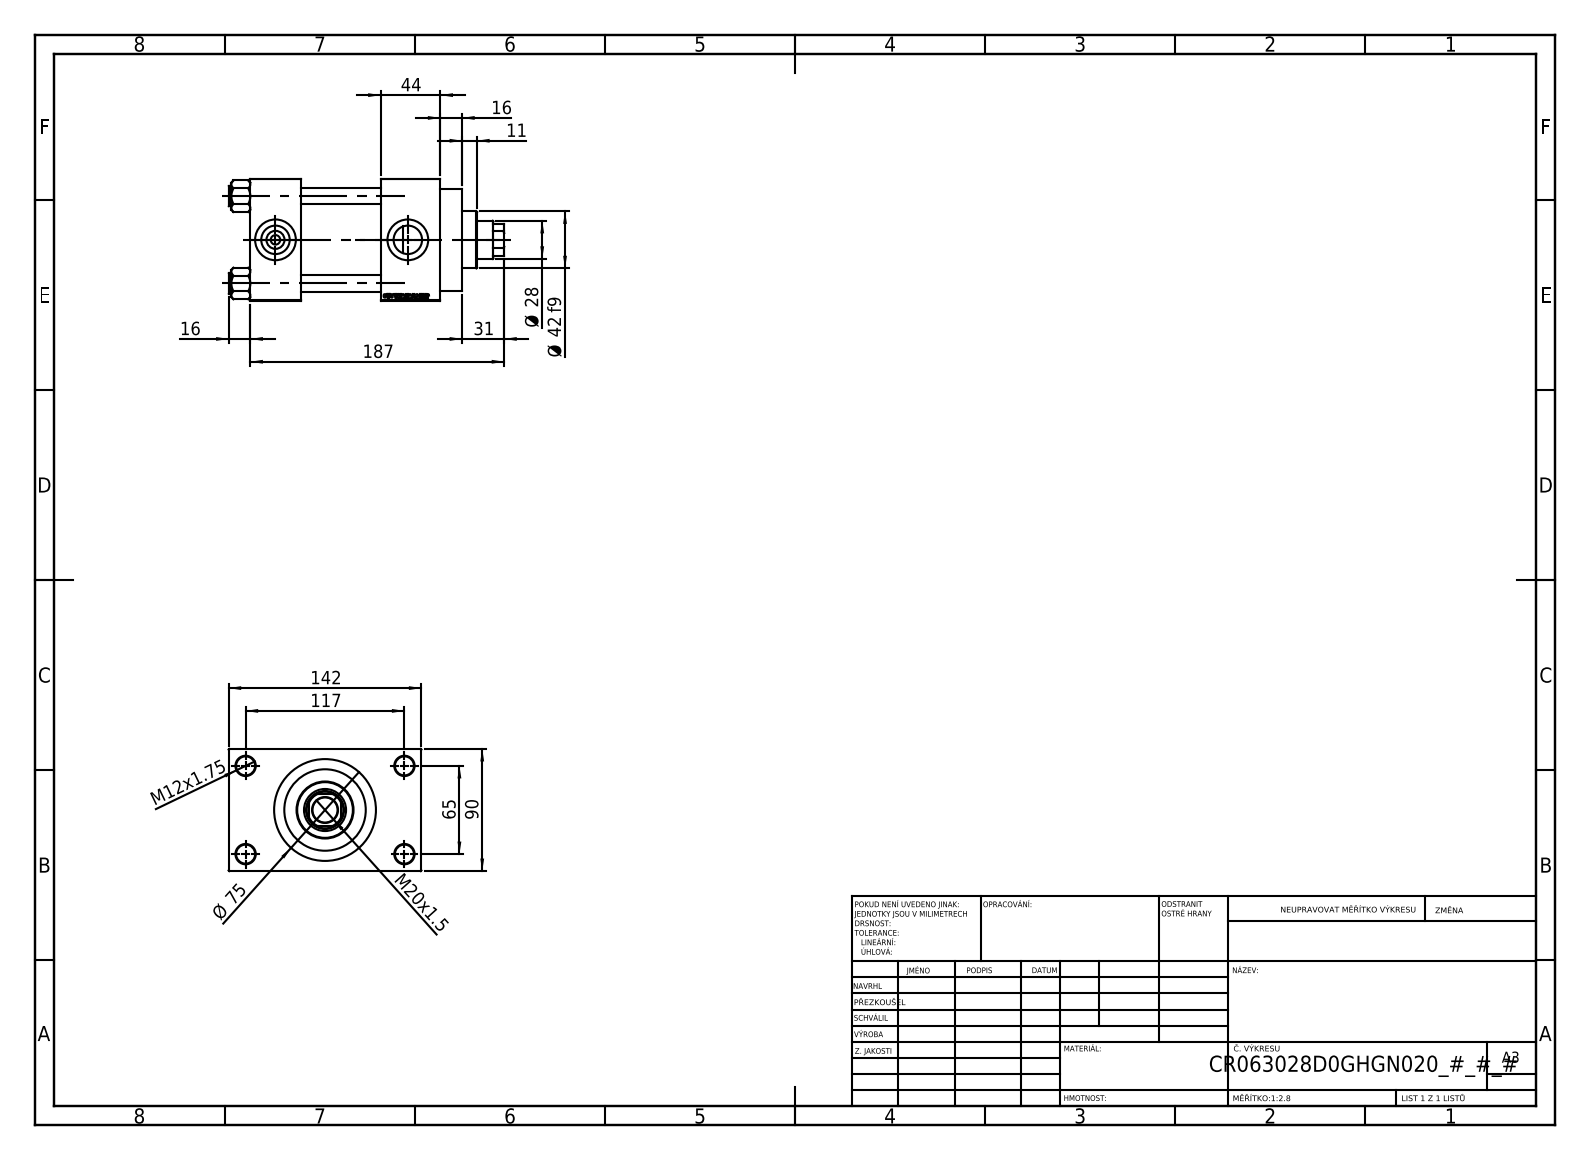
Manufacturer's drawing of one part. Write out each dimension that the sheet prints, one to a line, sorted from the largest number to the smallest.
187
142
117
90
Ø 75
65
44
Ø 42 f9
31
Ø 28
M20x1.5
16
16
M12x1.75
11
